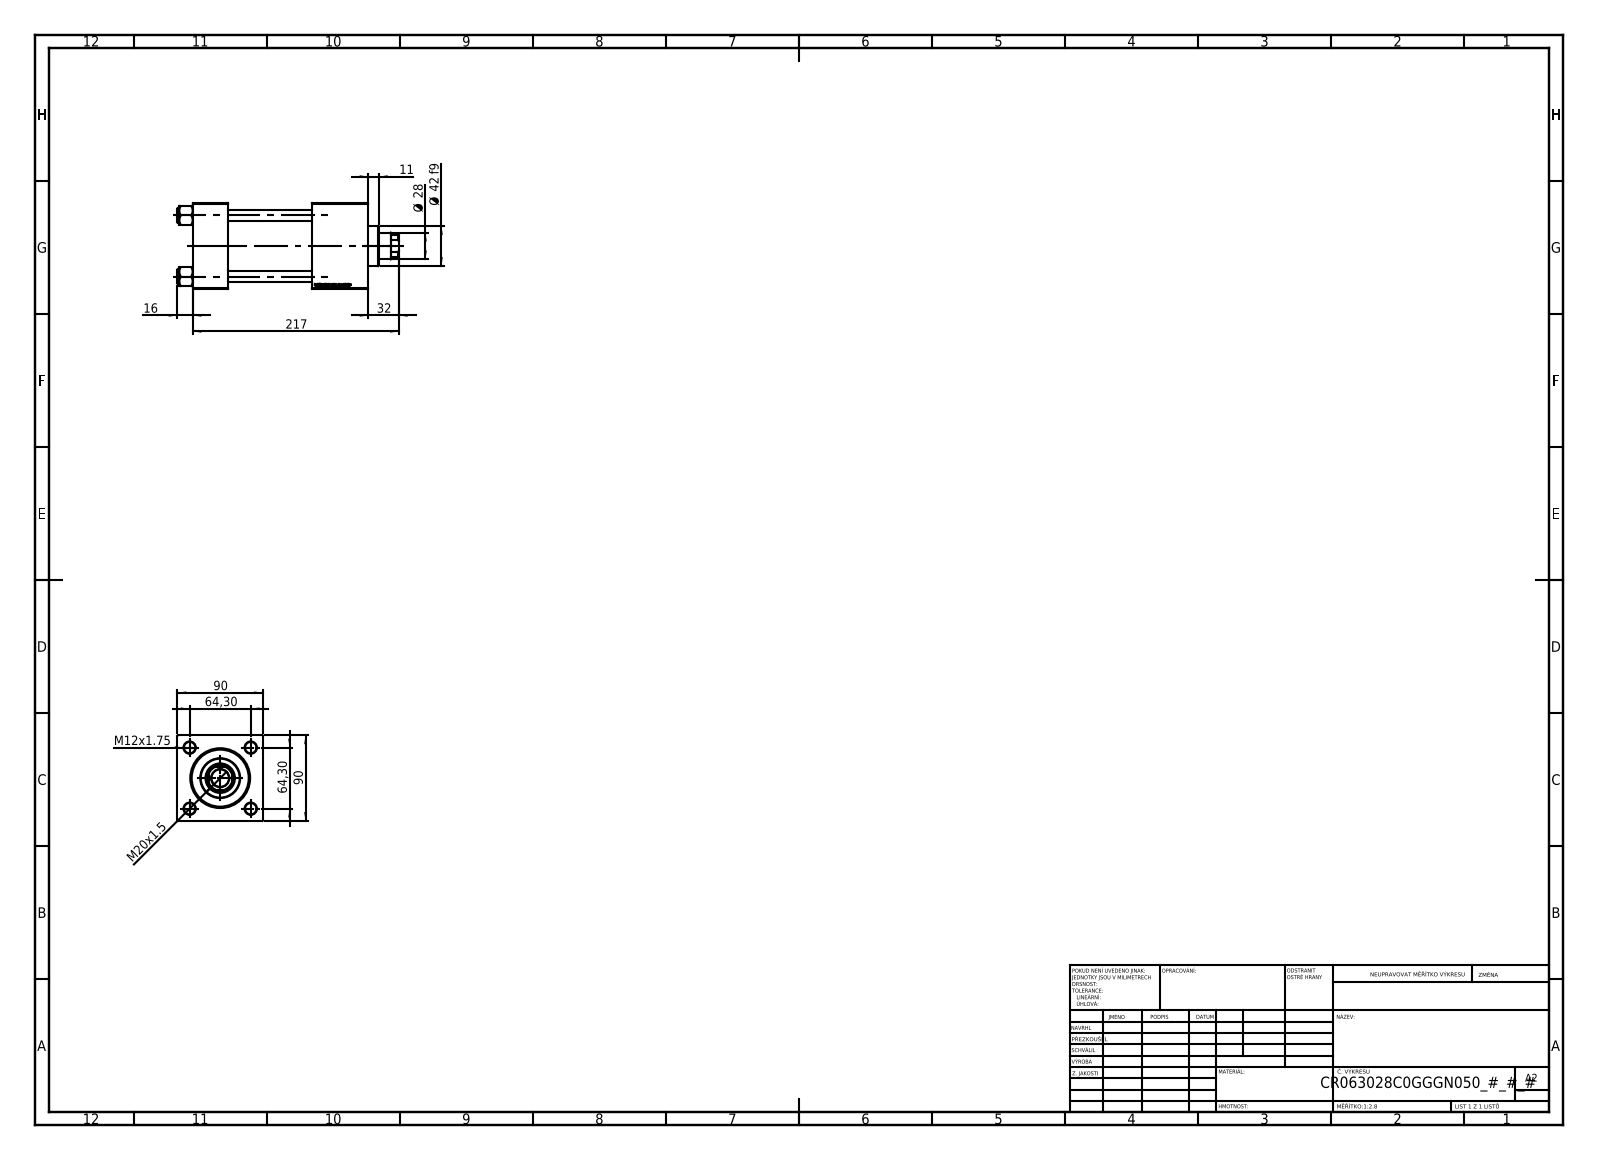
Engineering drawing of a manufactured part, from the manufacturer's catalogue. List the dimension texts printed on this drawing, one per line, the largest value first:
217
90
90
64,30
64,30
Ø 42 f9
32
Ø 28
M20x1.5
16
M12x1.75
11
